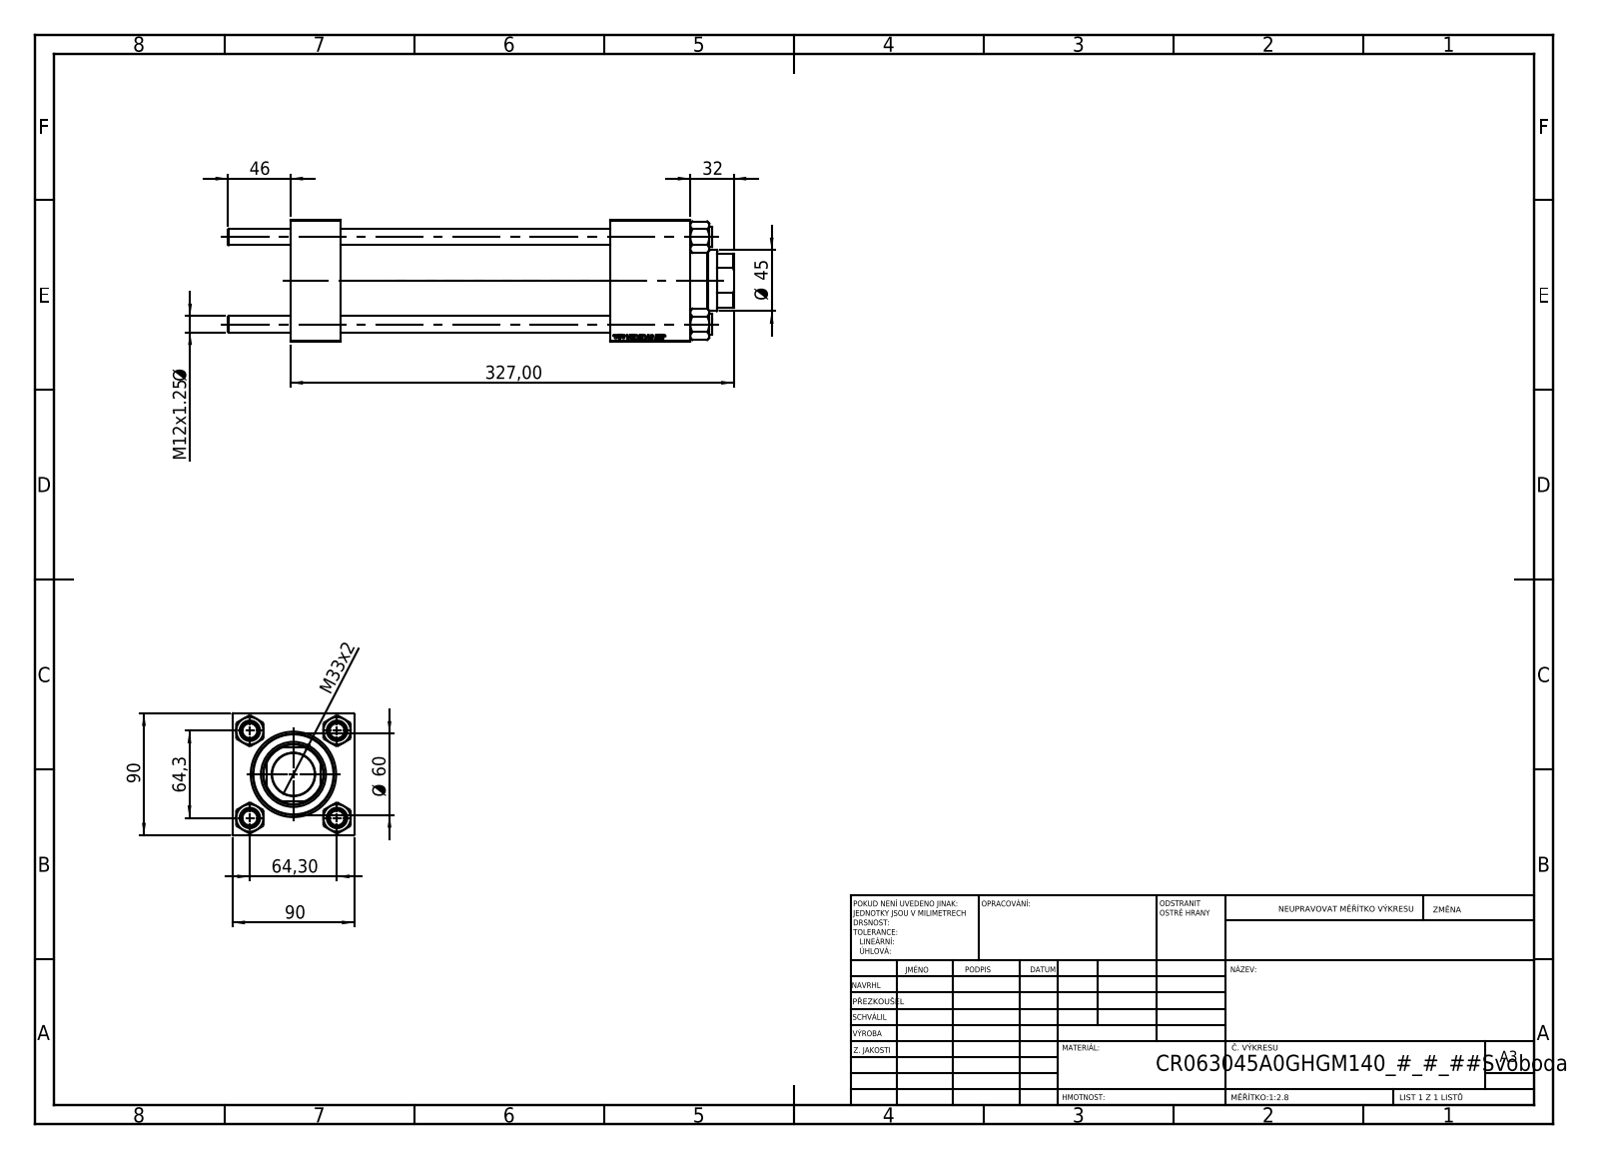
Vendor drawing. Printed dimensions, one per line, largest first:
327,00
90
90
64,3
64,30
Ø 60
46
Ø 45
M33x2
32
M12x1.25 Ø
